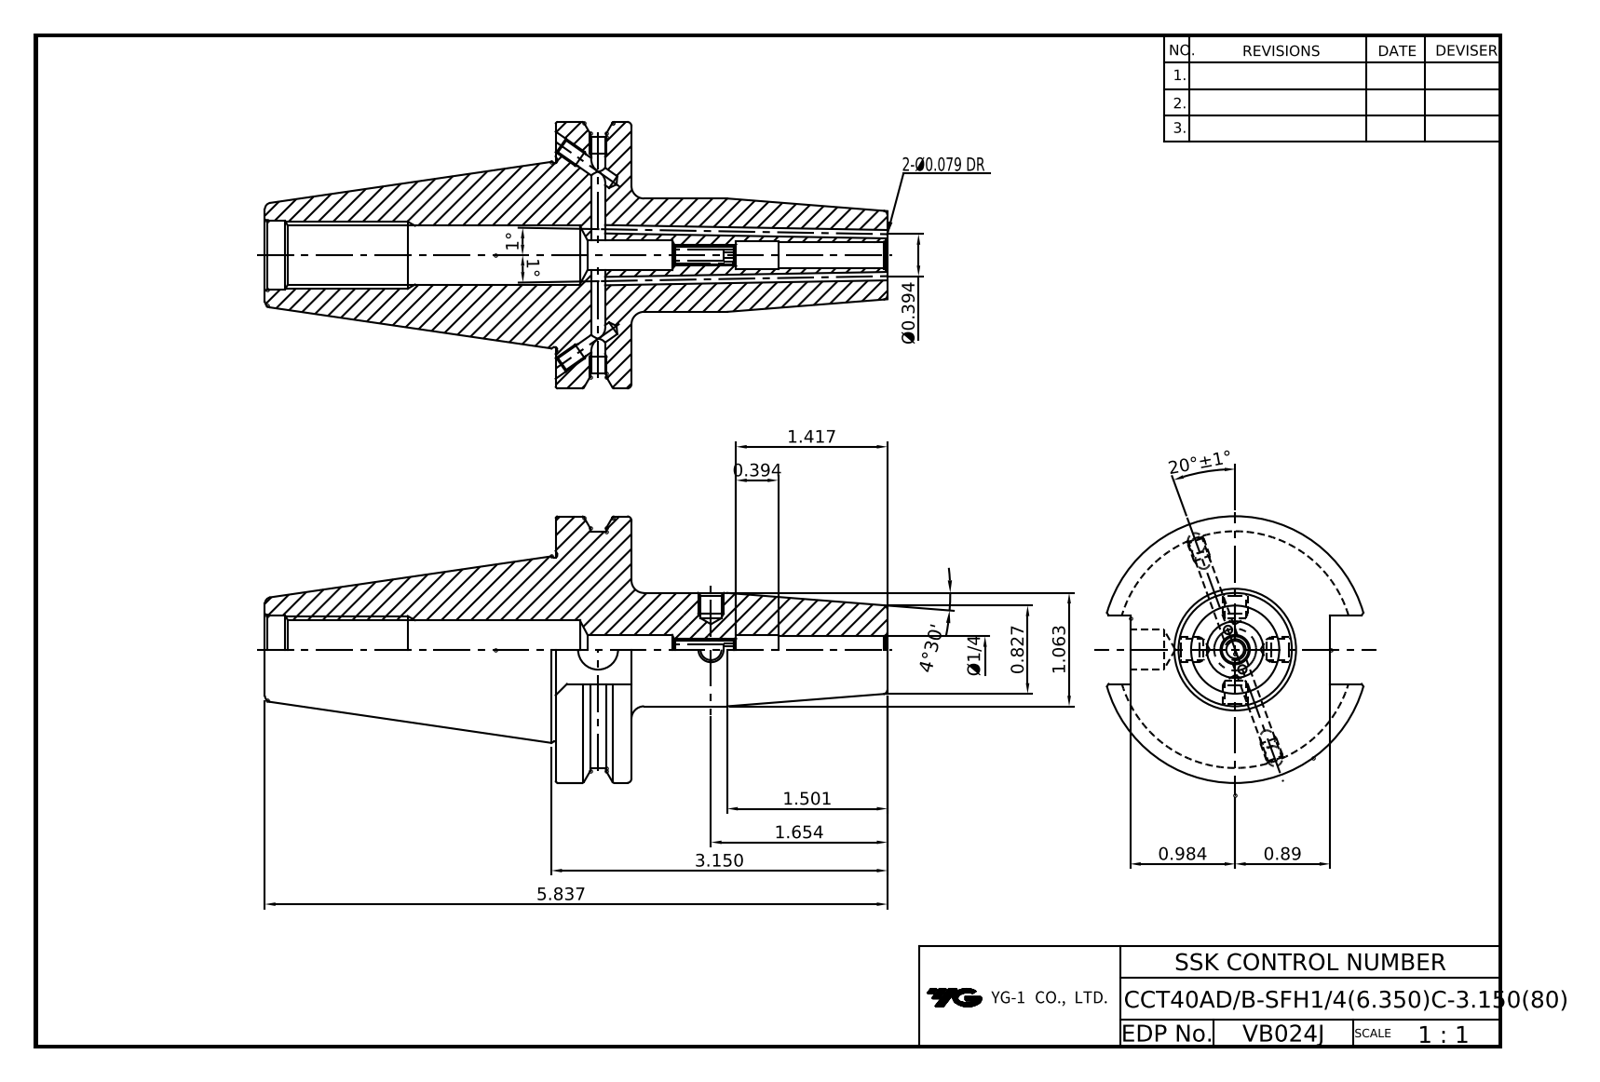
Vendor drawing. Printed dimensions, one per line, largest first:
20°±1°
5.837
4°30'
3.150
1.654
1.501
1.417
1.063
1°
1°
0.984
0.89
0.827
0.394
Ø0.394
